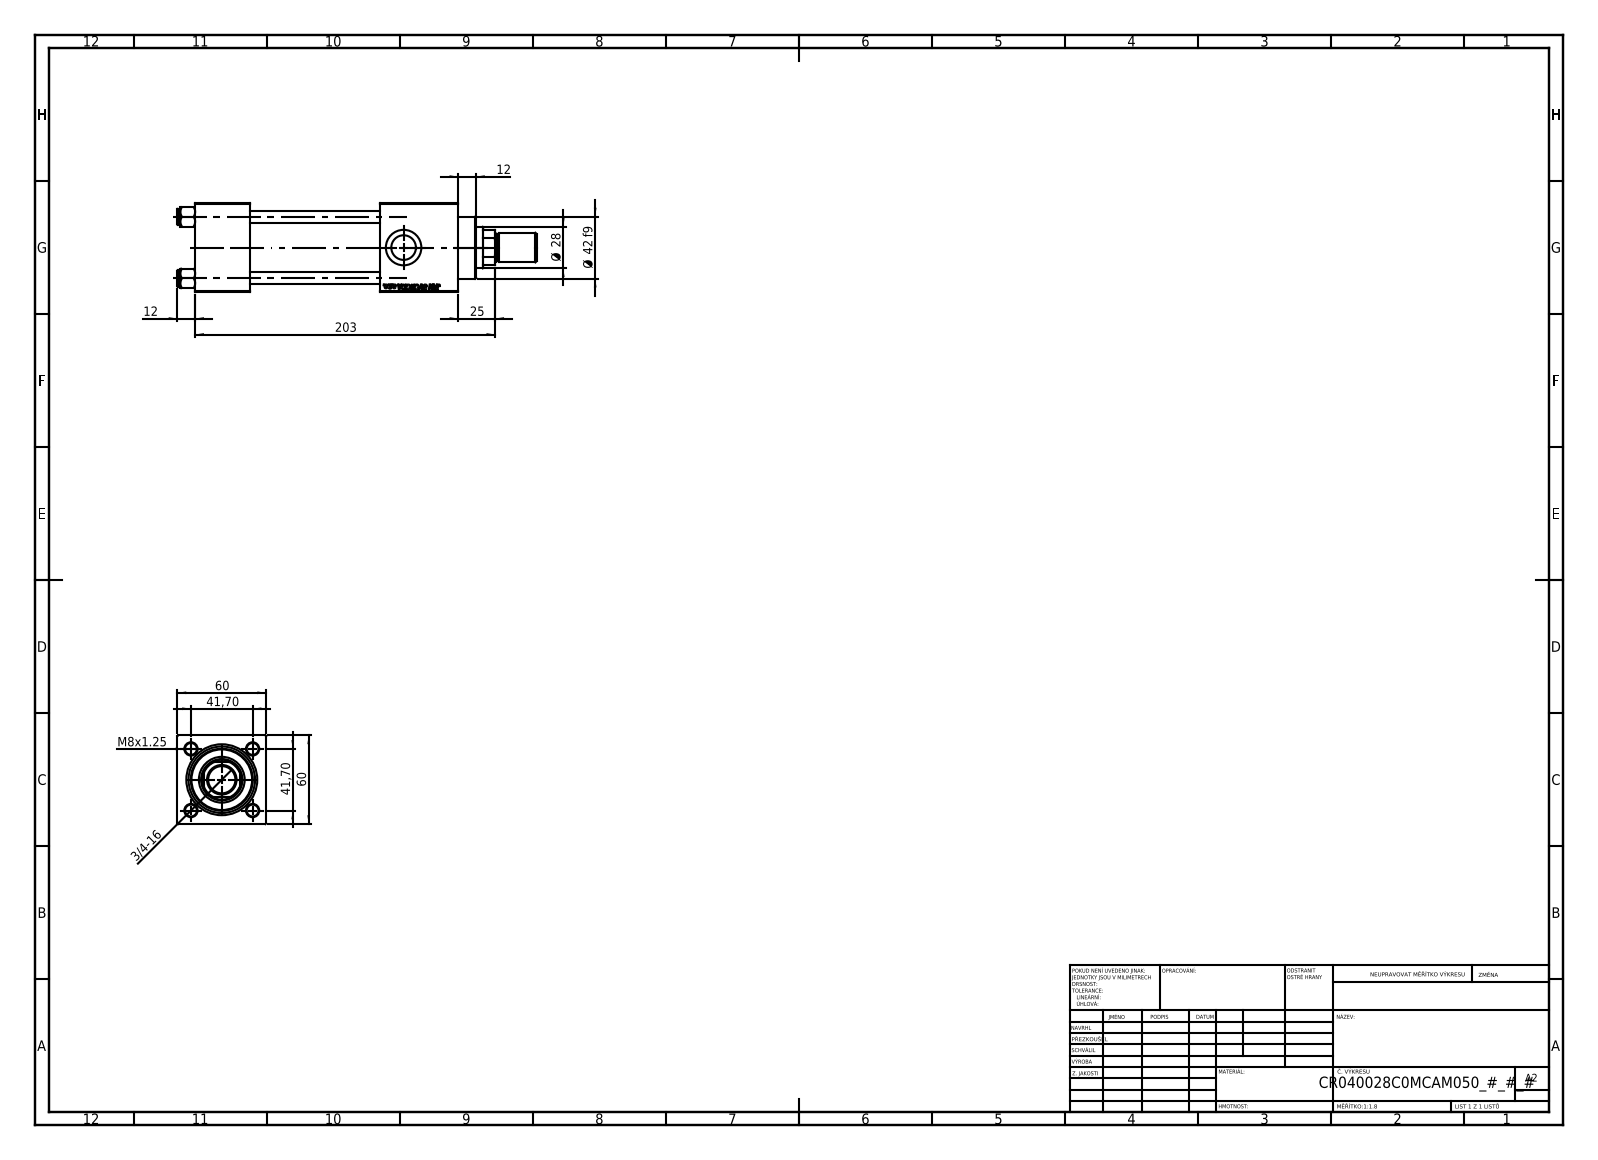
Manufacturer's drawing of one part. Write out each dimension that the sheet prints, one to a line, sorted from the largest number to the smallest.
203
60
60
Ø 42 f9
41,70
41,70
Ø 28
25
12
12
M8x1.25
3/4-16
